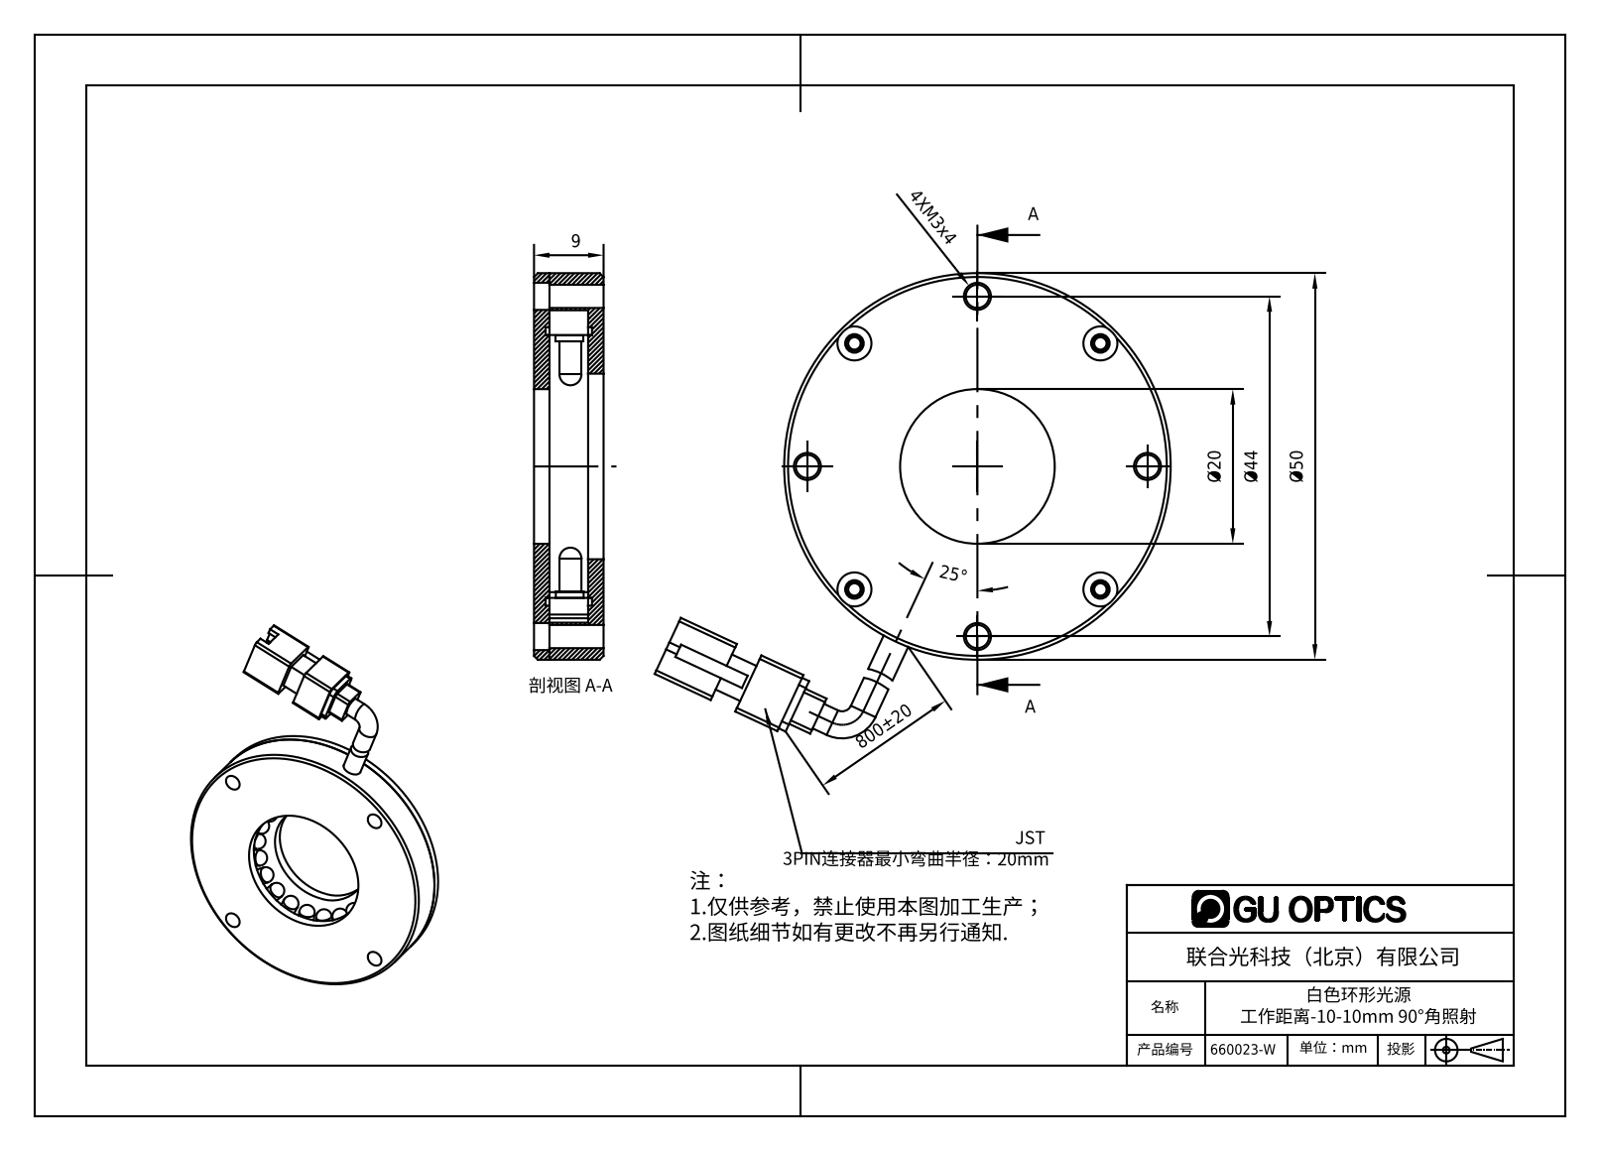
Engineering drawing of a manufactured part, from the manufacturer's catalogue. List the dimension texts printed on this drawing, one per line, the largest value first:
800±20
Ø50
Ø44
25°
Ø20
9
4XM3x4
